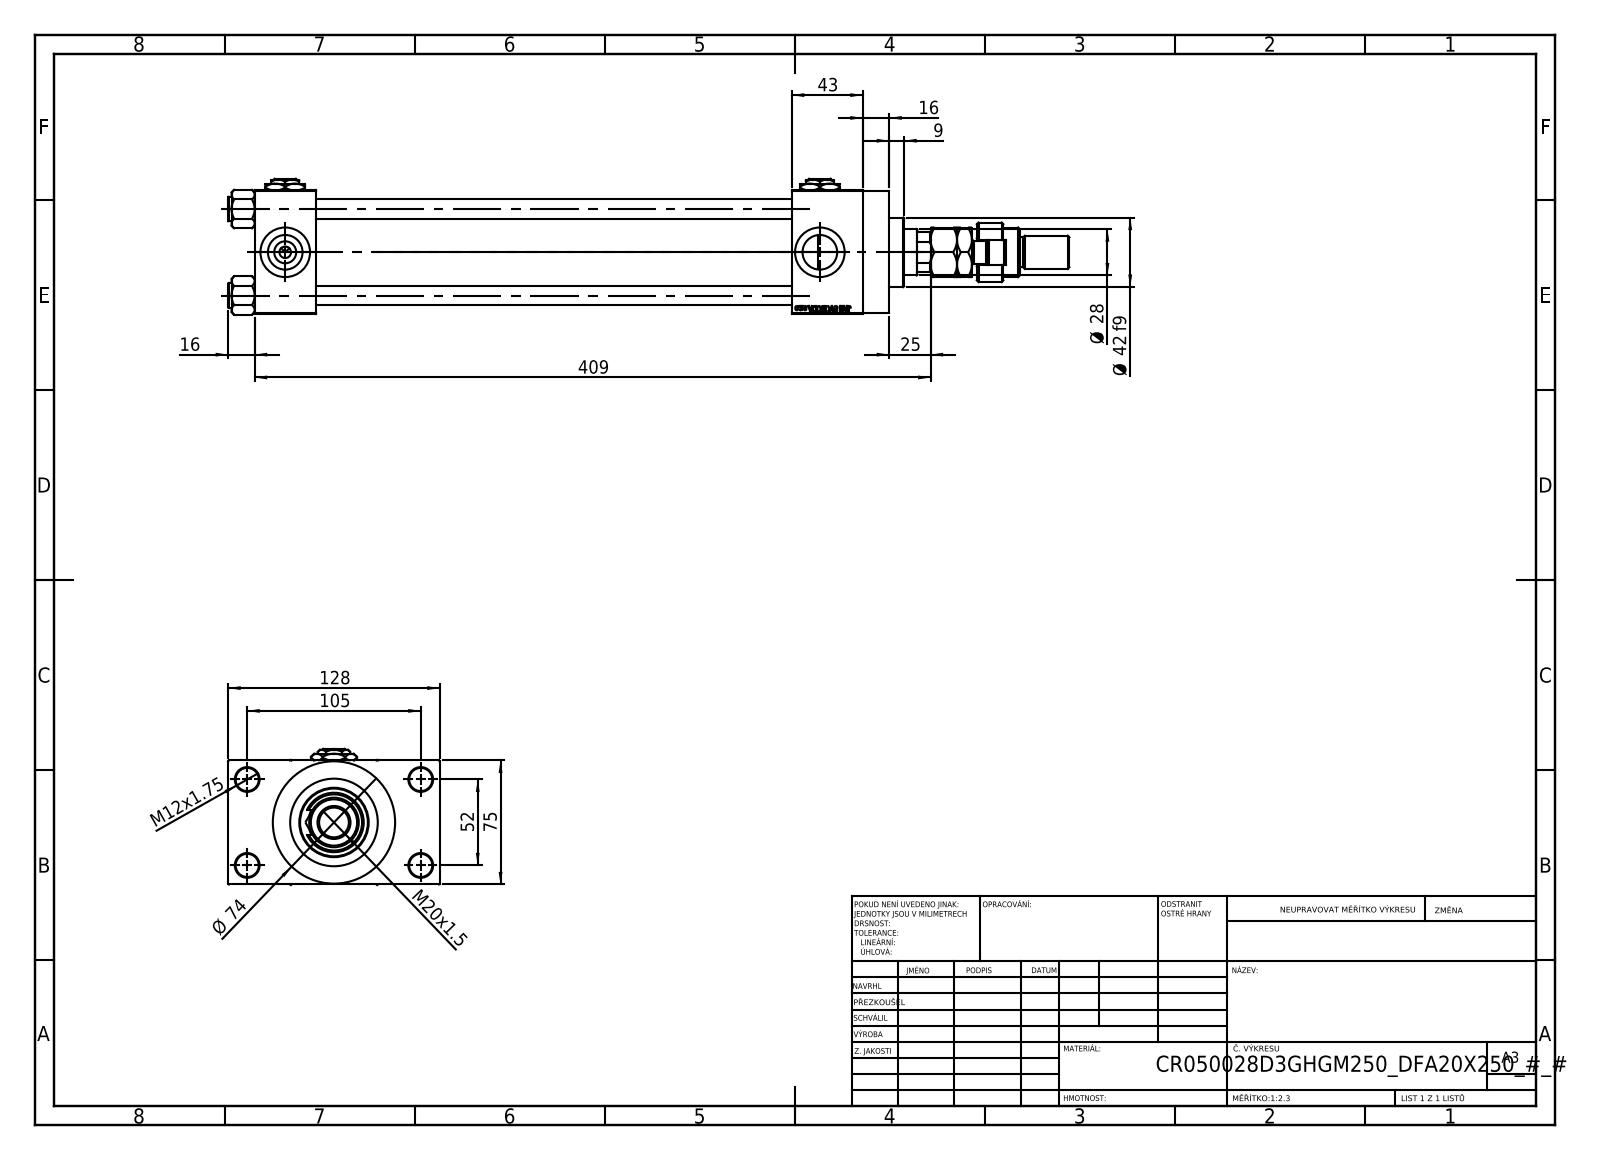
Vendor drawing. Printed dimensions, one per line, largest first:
409
128
105
75
Ø 74
52
43
Ø 42 f9
Ø 28
25
M20x1.5
16
16
M12x1.75
9
